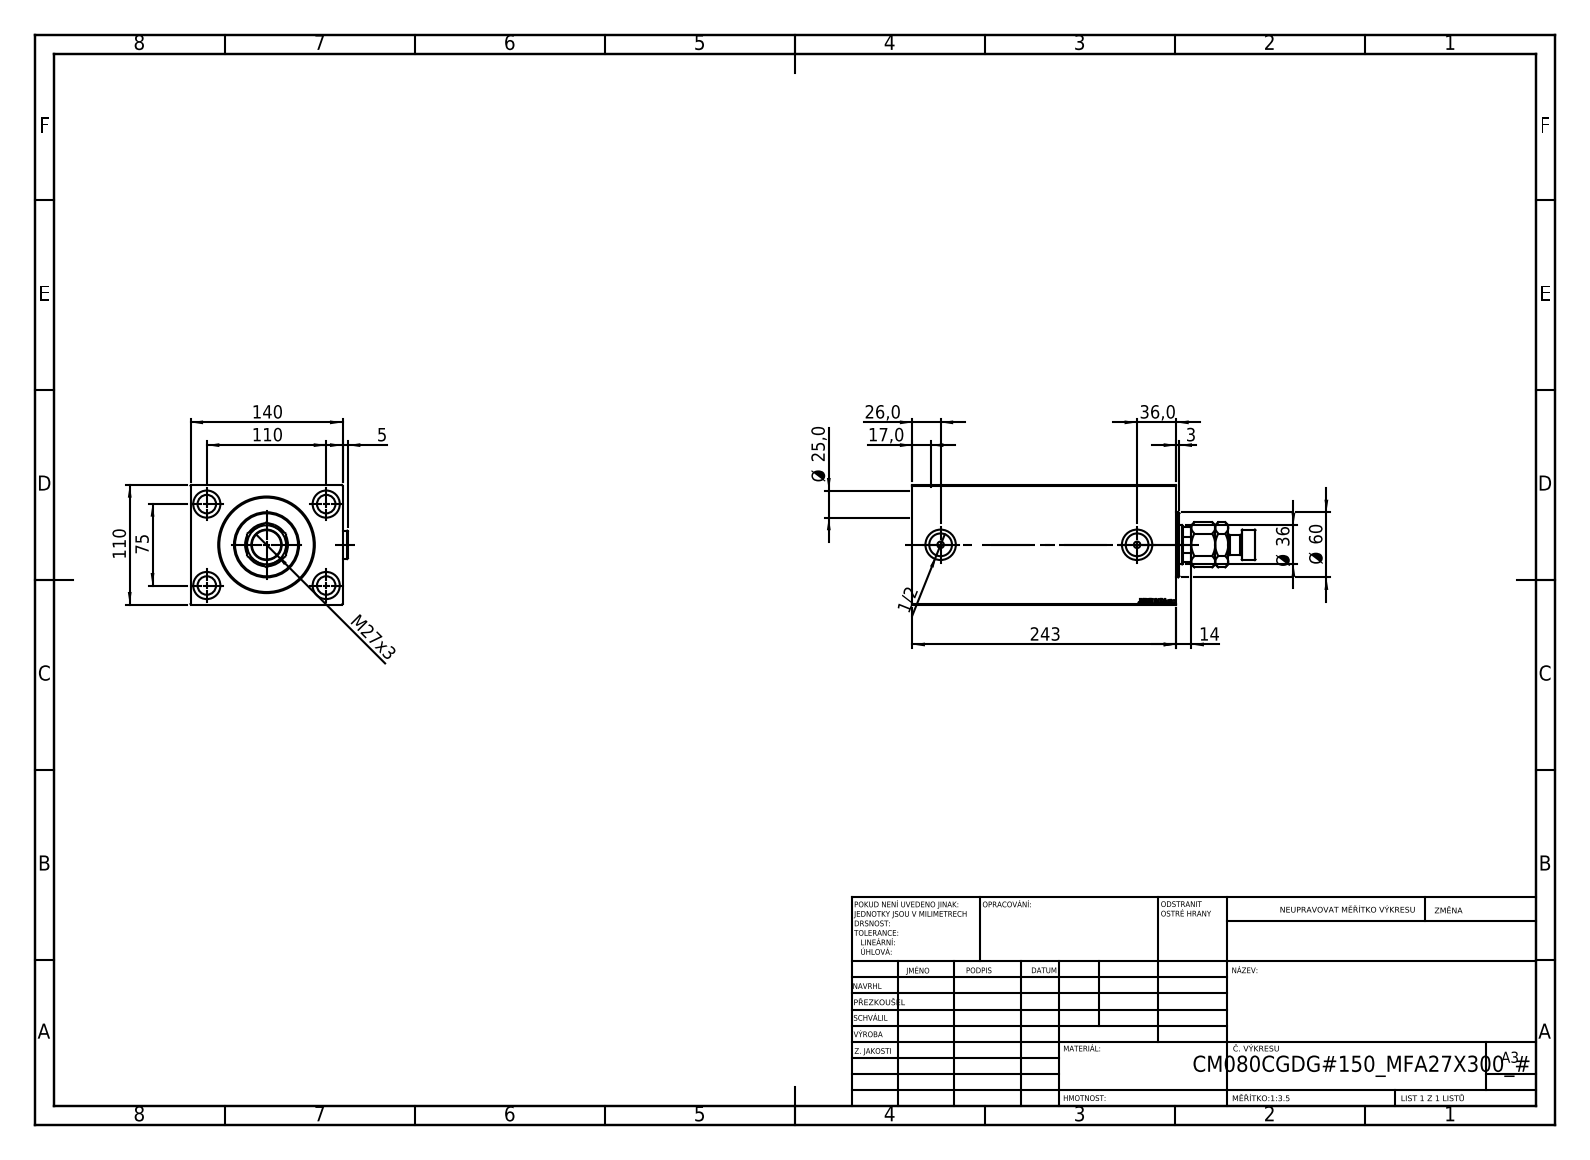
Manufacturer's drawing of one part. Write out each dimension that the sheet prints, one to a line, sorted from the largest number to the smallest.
243
140
110
110
75
Ø 60
Ø 36
36,0
M27x3
26,0
Ø 25,0
17,0
14
5
3
1/2
